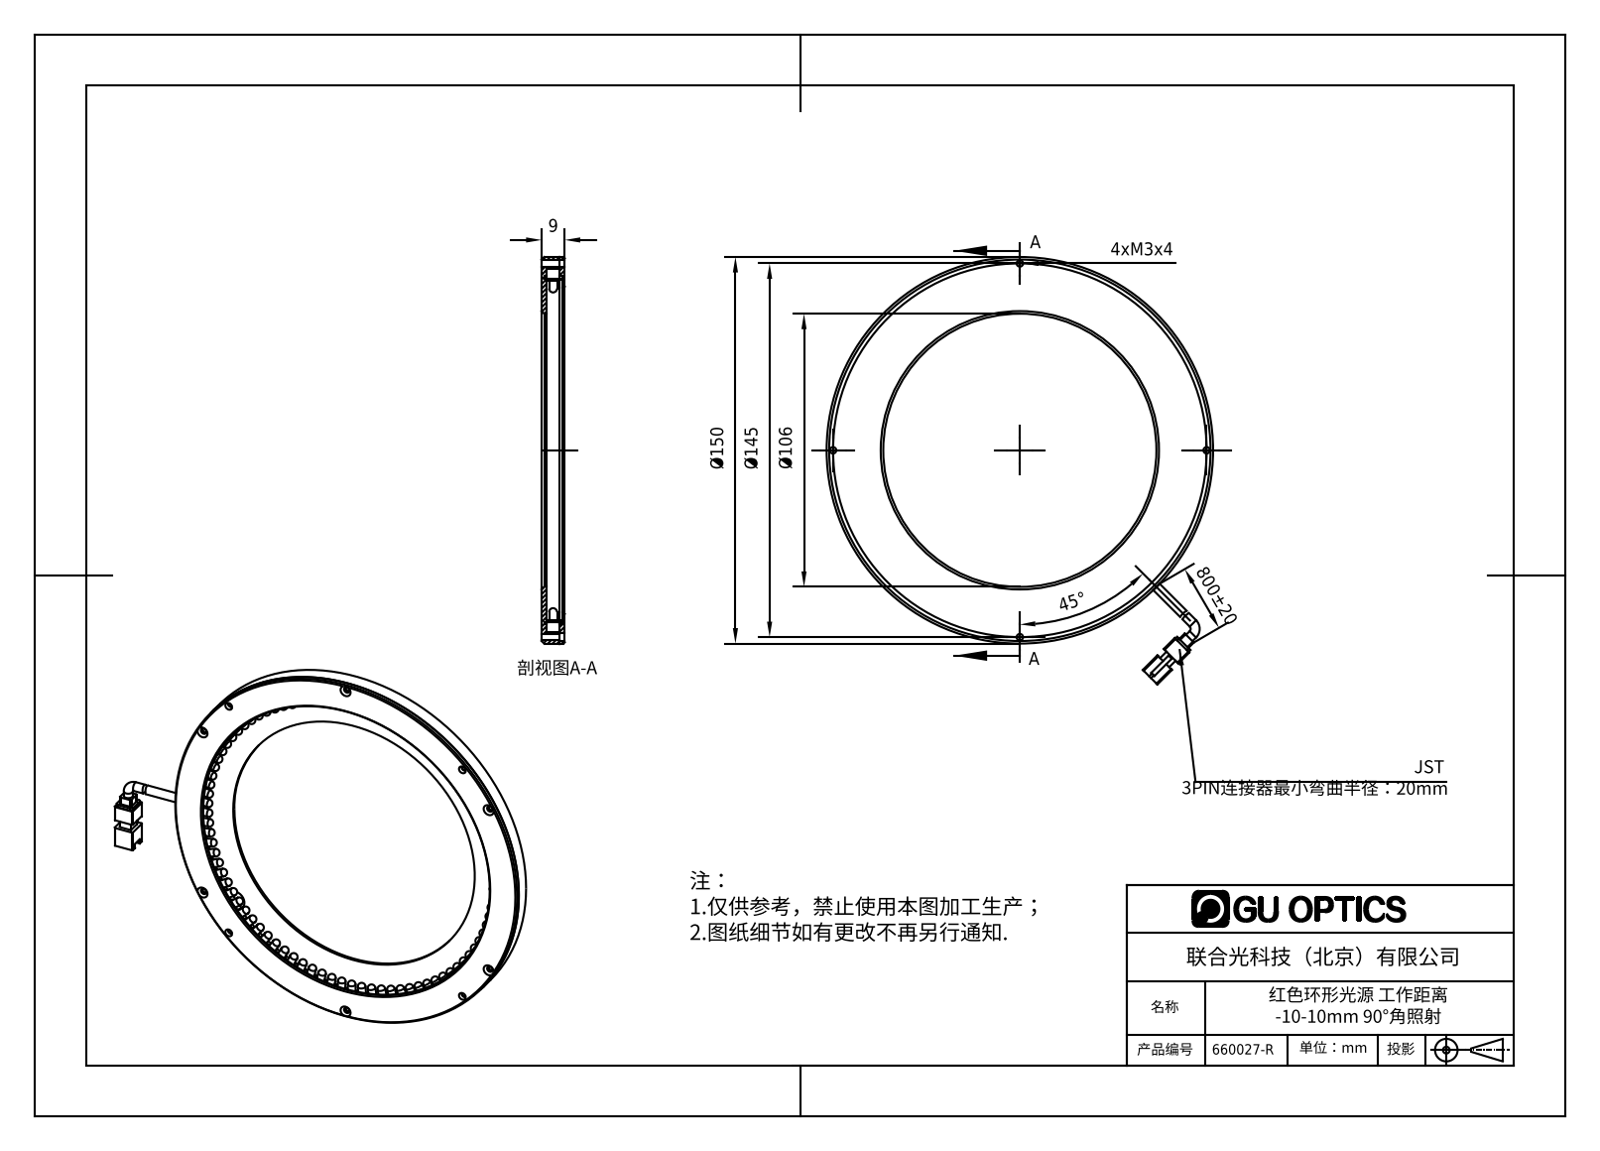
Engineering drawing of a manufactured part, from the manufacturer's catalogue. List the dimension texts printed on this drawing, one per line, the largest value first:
800±20
Ø150
Ø145
Ø106
45°
9
4xM3x4
